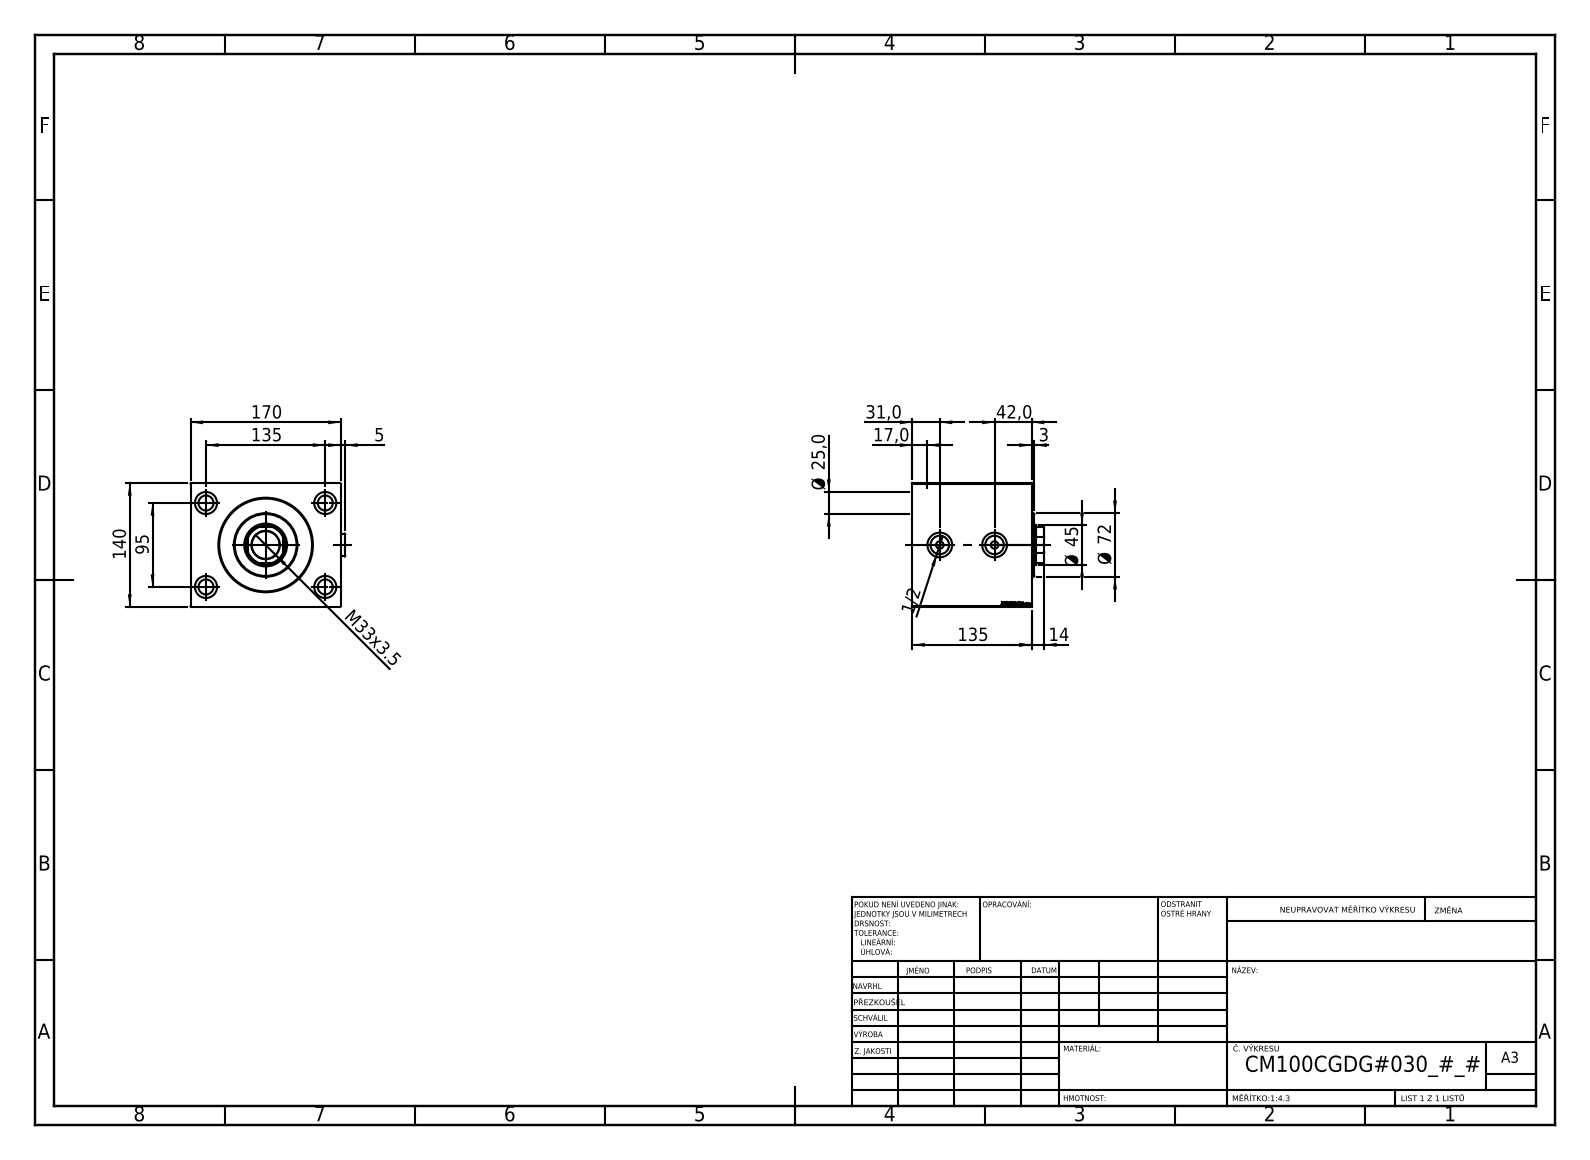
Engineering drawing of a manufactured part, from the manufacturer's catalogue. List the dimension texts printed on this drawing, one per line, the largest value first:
170
140
135
135
95
Ø 72
Ø 45
42,0
M33x3.5
31,0
Ø 25,0
17,0
14
5
3
1/2
